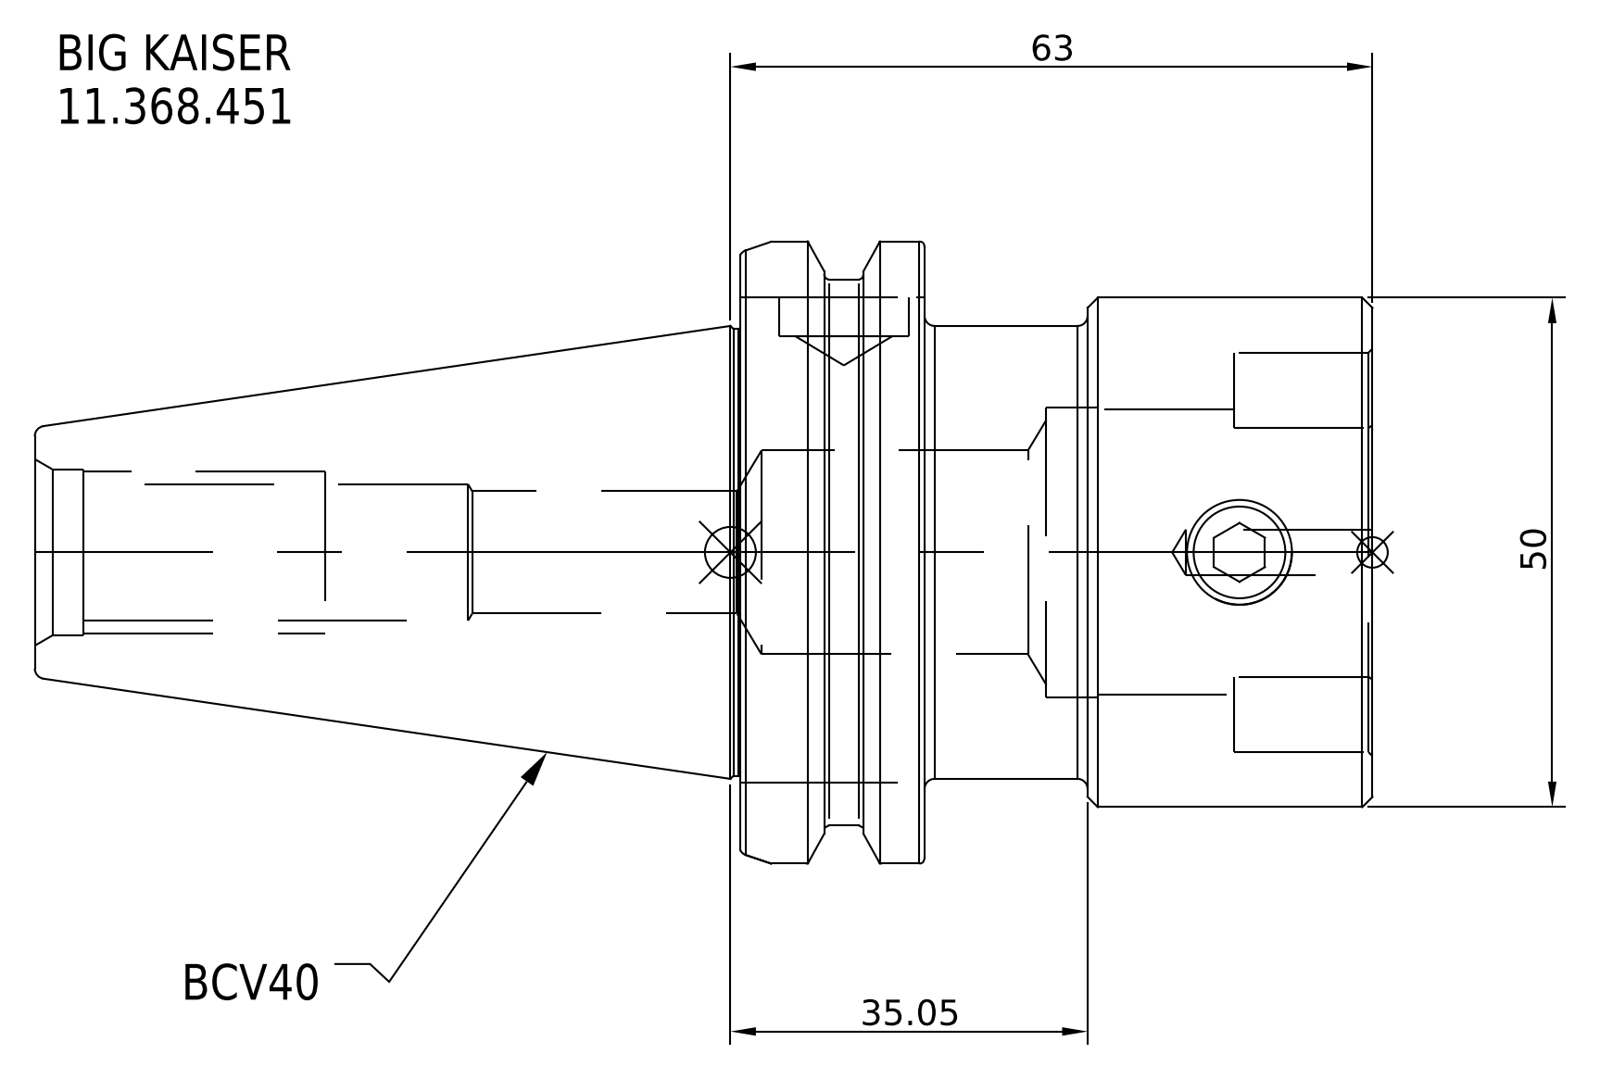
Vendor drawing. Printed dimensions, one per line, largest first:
63
50
35.05
